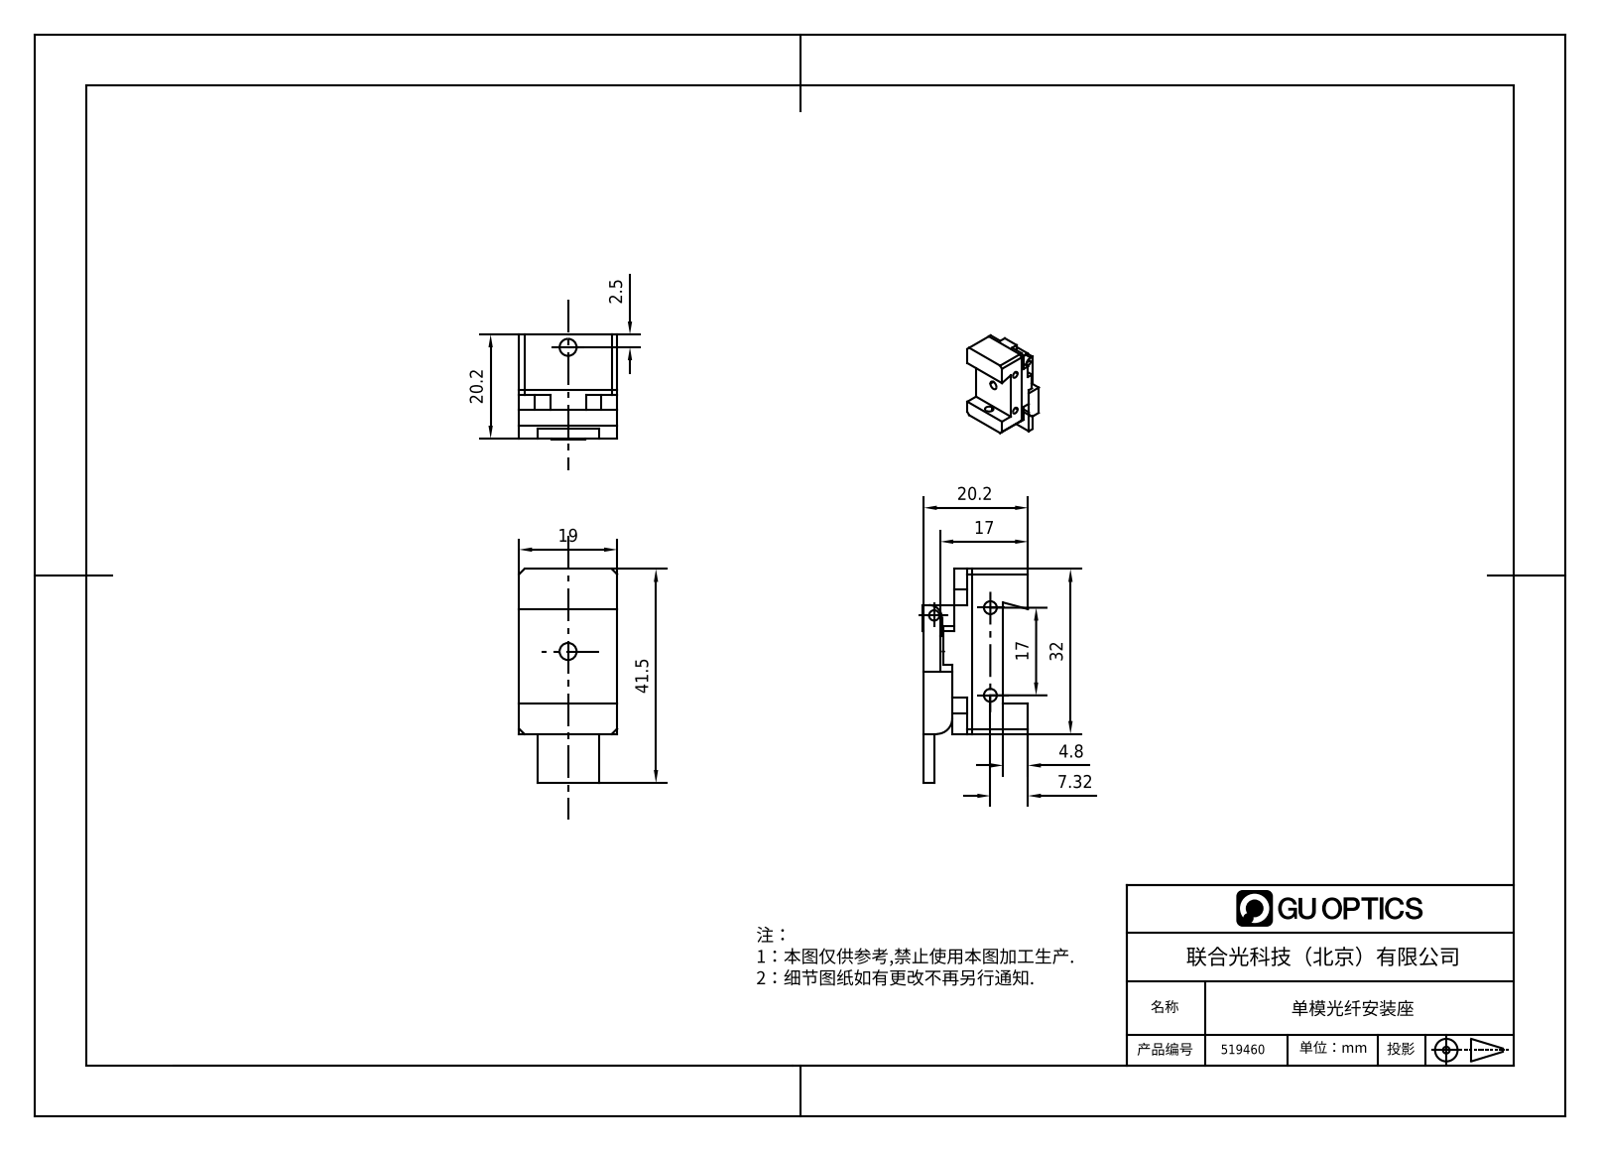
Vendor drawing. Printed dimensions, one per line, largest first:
41.5
32
20.2
20.2
19
17
17
7.32
4.8
2.5
